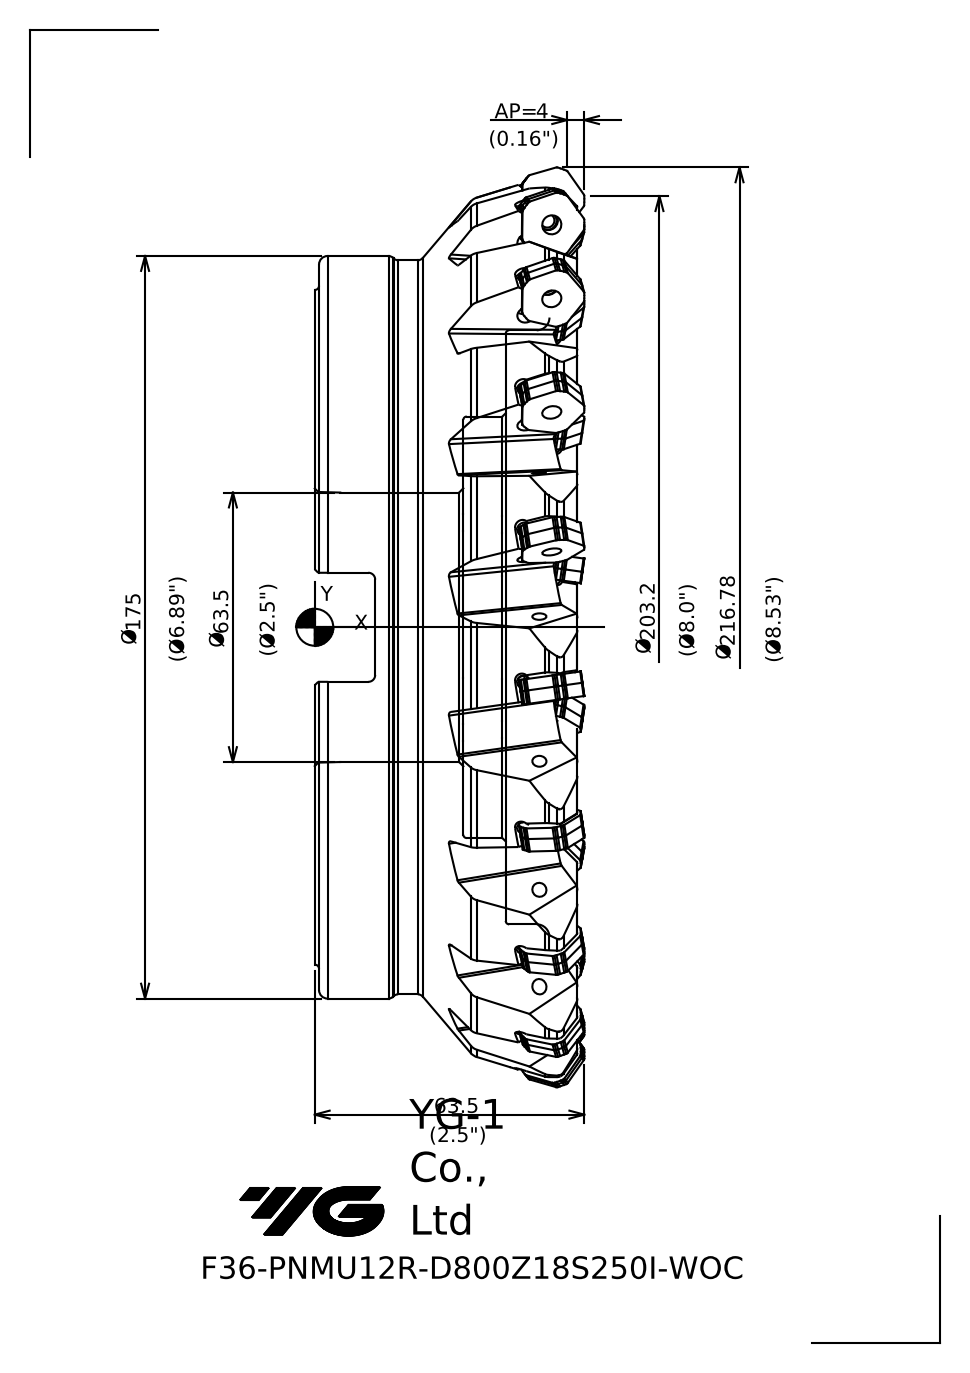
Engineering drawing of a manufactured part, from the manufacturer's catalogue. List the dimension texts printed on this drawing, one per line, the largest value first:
216.78 Ø
203.2 Ø
175 Ø
63.5 Ø
63.5
4 AP=
